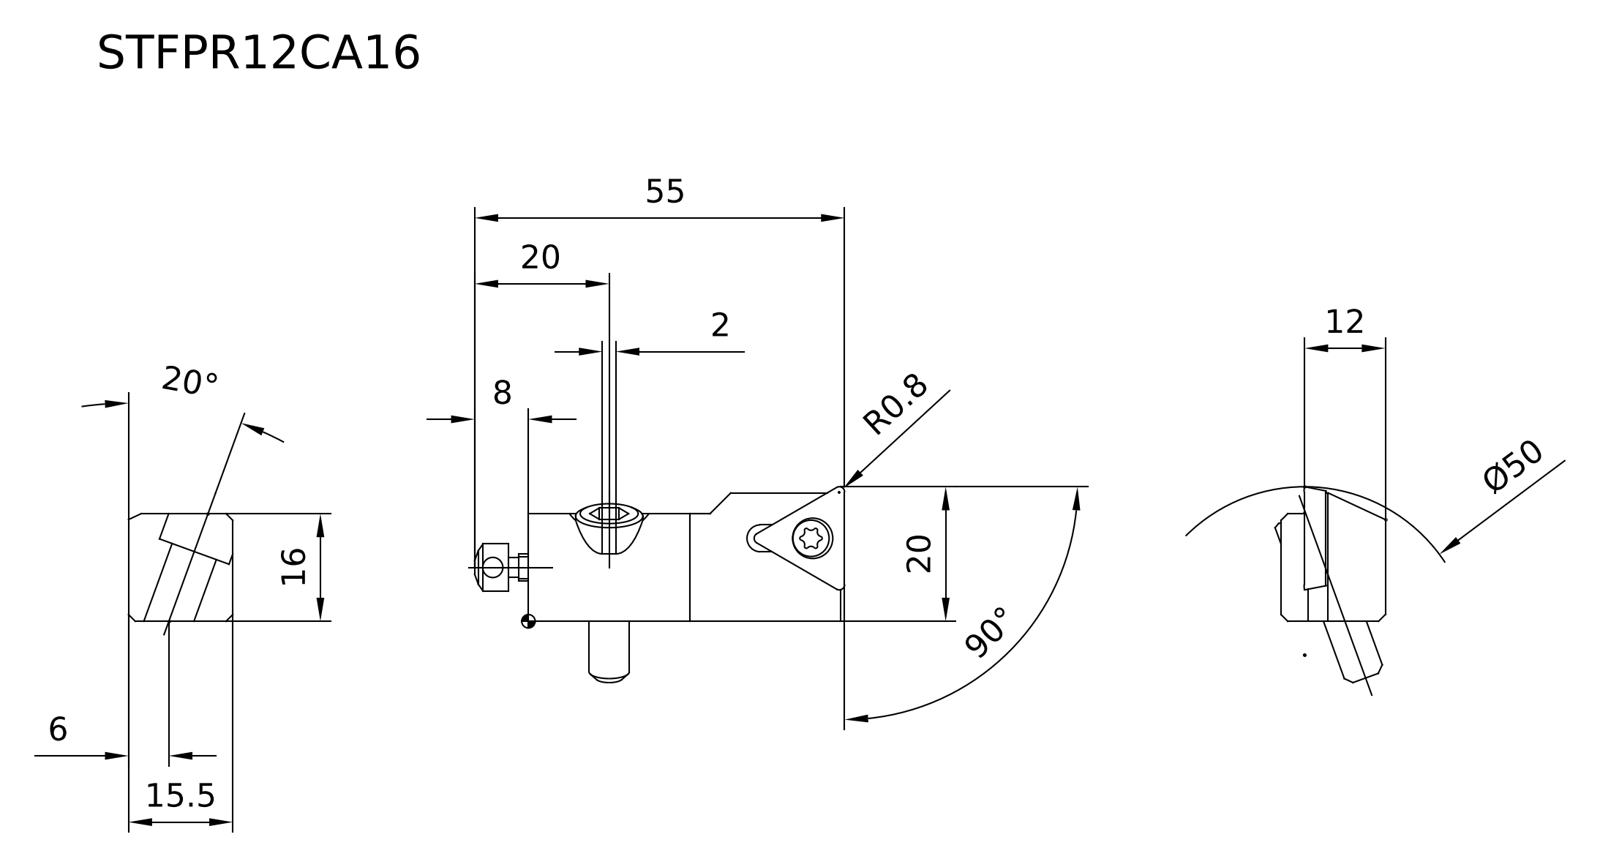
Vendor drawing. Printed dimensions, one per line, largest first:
90°
55
Ø50
20°
20
20
16
15.5
12
8
6
2
R0.8
